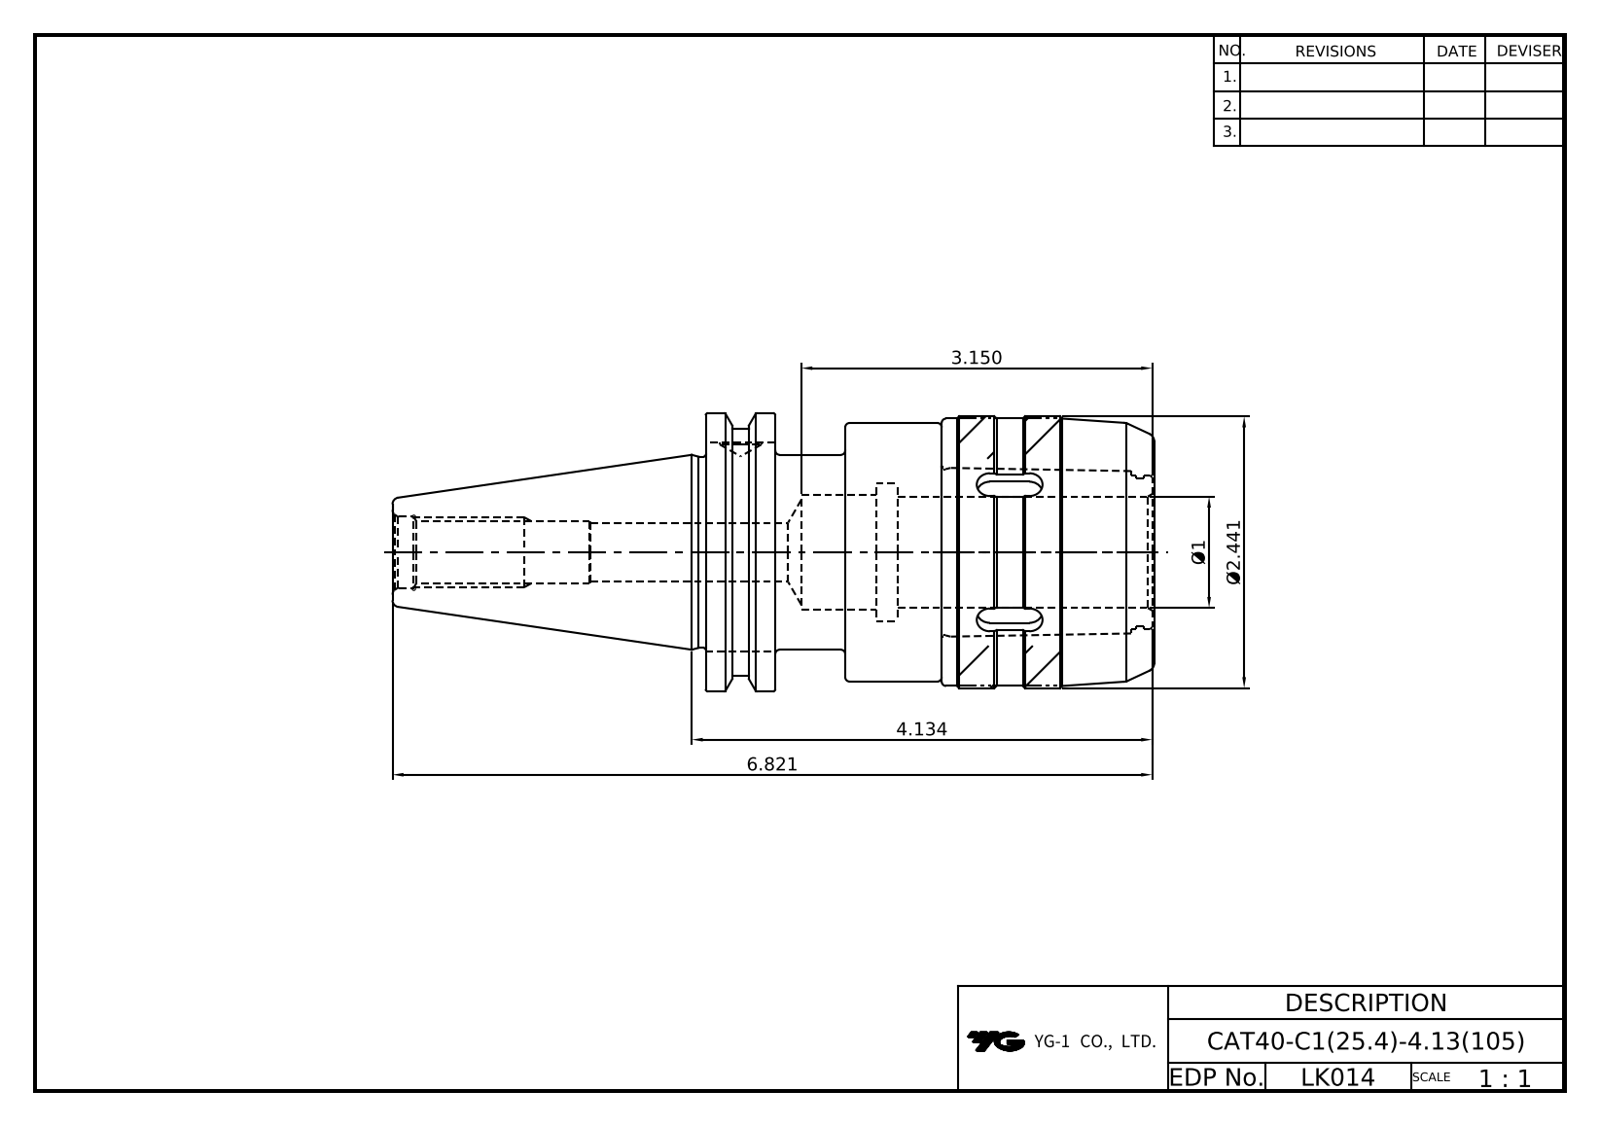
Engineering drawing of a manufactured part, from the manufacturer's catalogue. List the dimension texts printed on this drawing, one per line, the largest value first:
6.821
4.134
3.150
Ø2.441
Ø1
